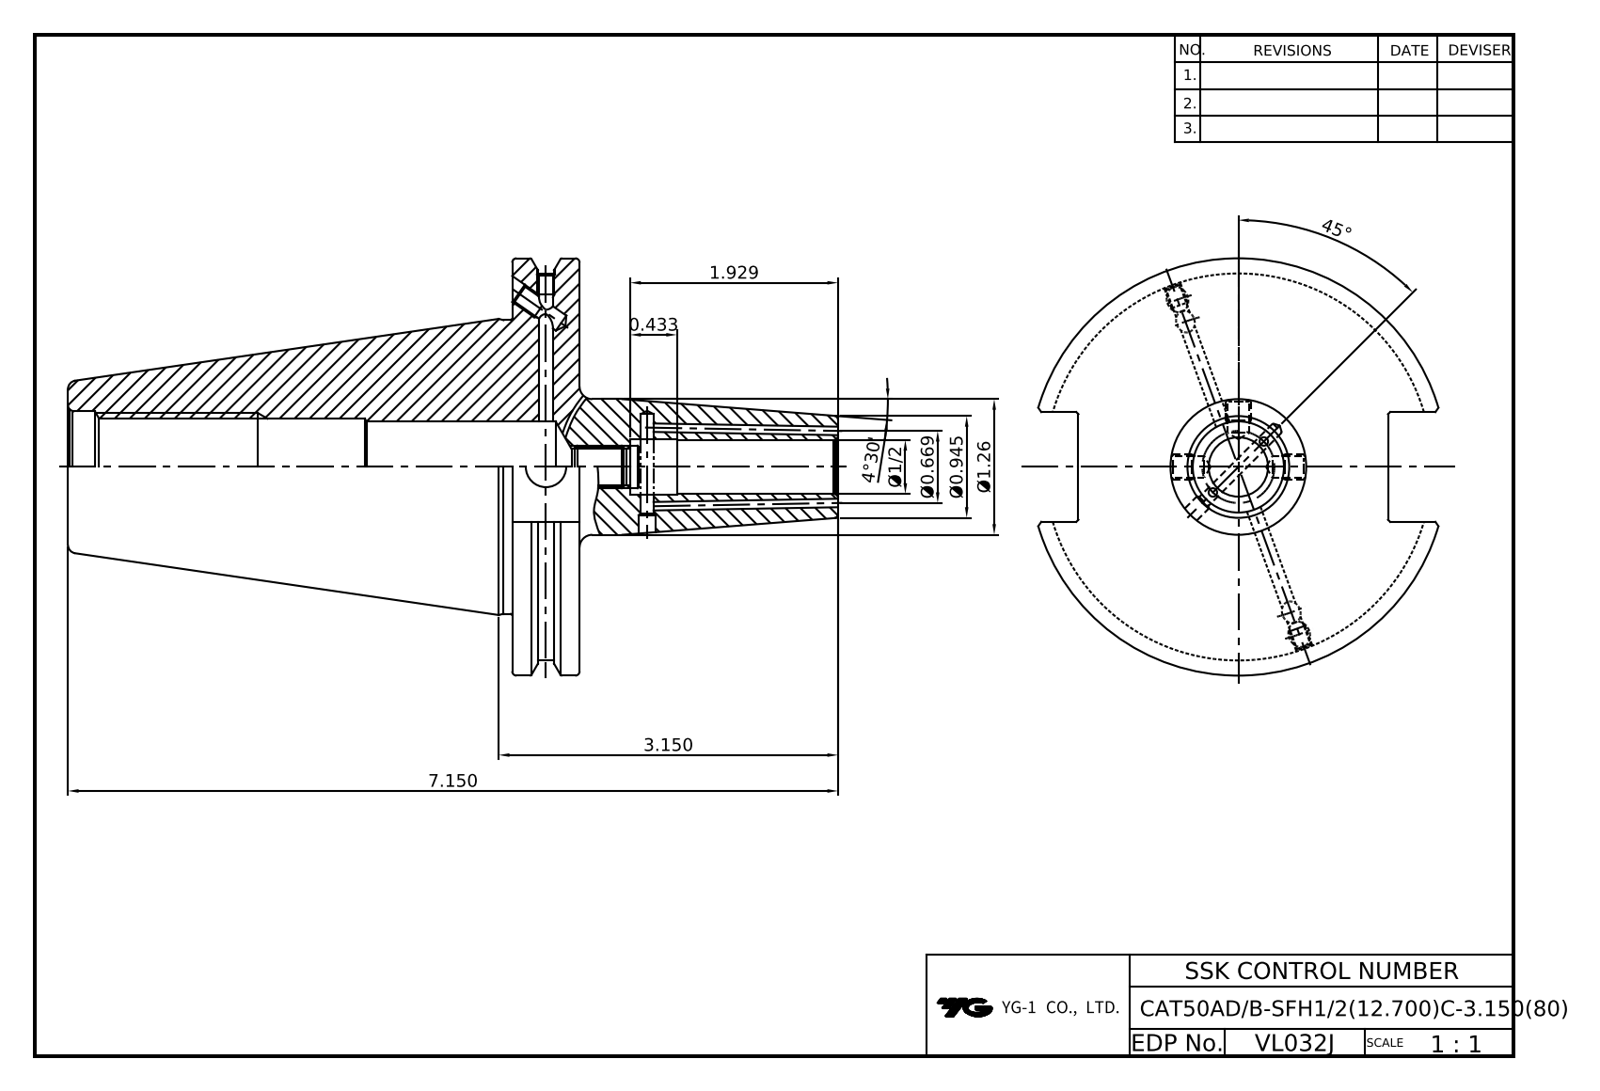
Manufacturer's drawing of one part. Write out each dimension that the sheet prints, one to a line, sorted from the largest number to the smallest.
45°
7.150
4°30'
3.150
1.929
Ø1.26
Ø0.945
Ø0.669
Ø1/2
0.433
